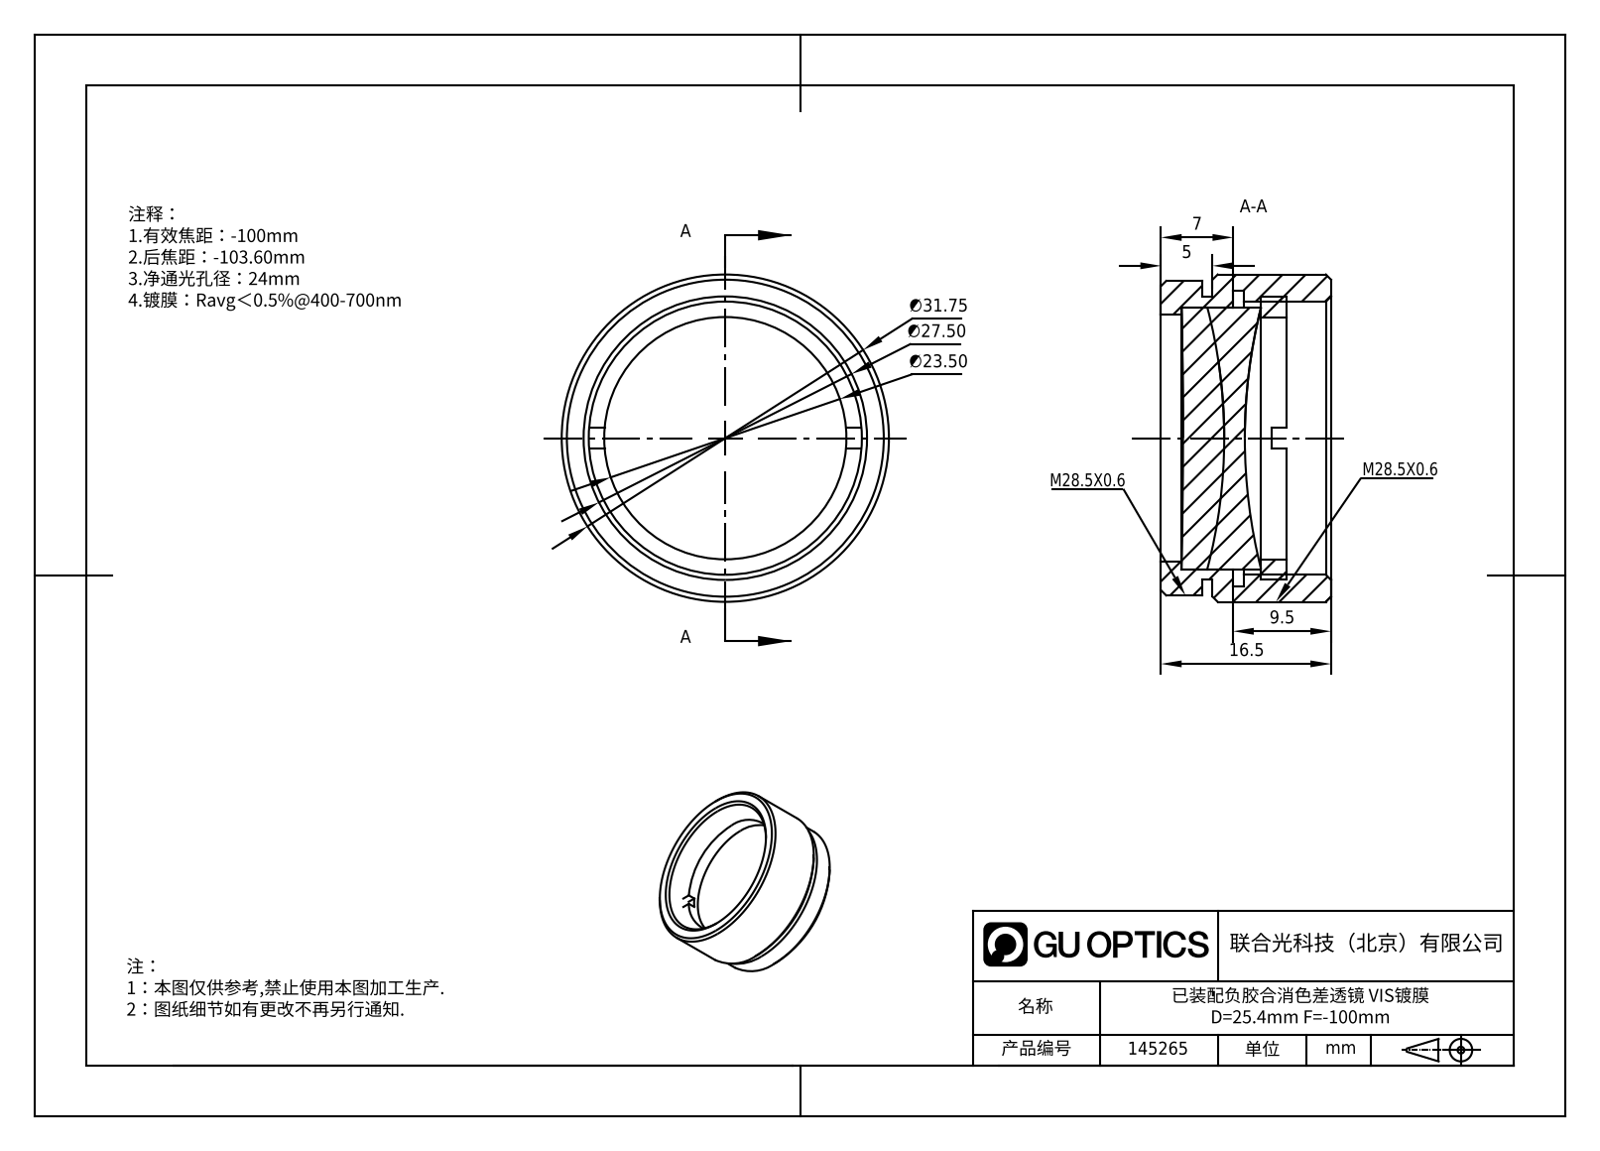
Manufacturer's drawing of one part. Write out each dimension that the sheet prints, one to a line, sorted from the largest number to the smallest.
∅31.75
∅27.50
∅23.50
16.5
9.5
7
5
